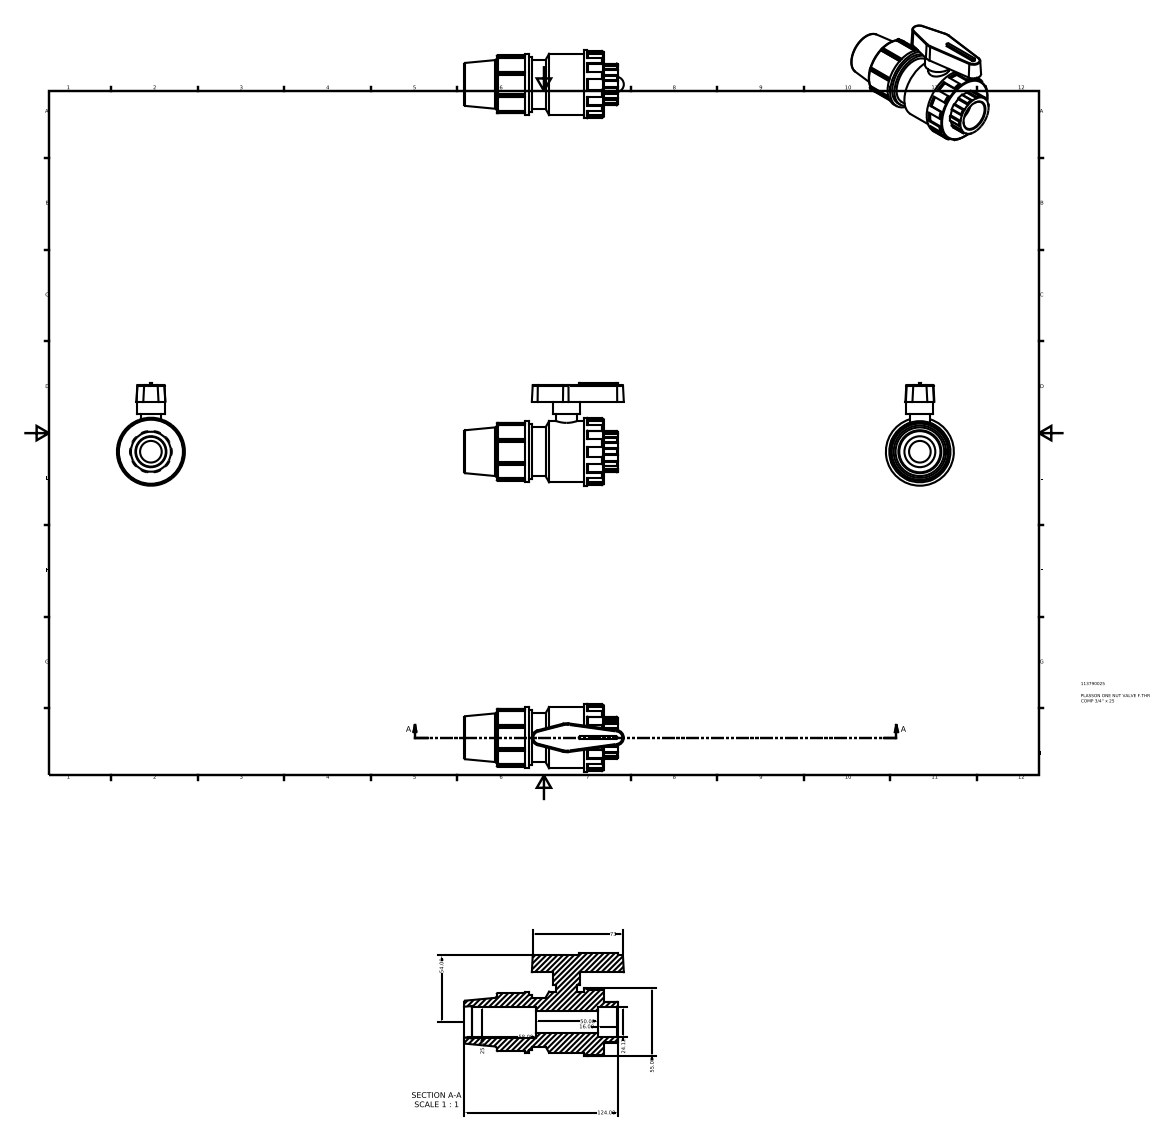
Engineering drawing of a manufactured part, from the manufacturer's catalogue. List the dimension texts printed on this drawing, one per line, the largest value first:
124.00
73
58.00
55.00
54.00
50.00
25.00
24.12
16.00
